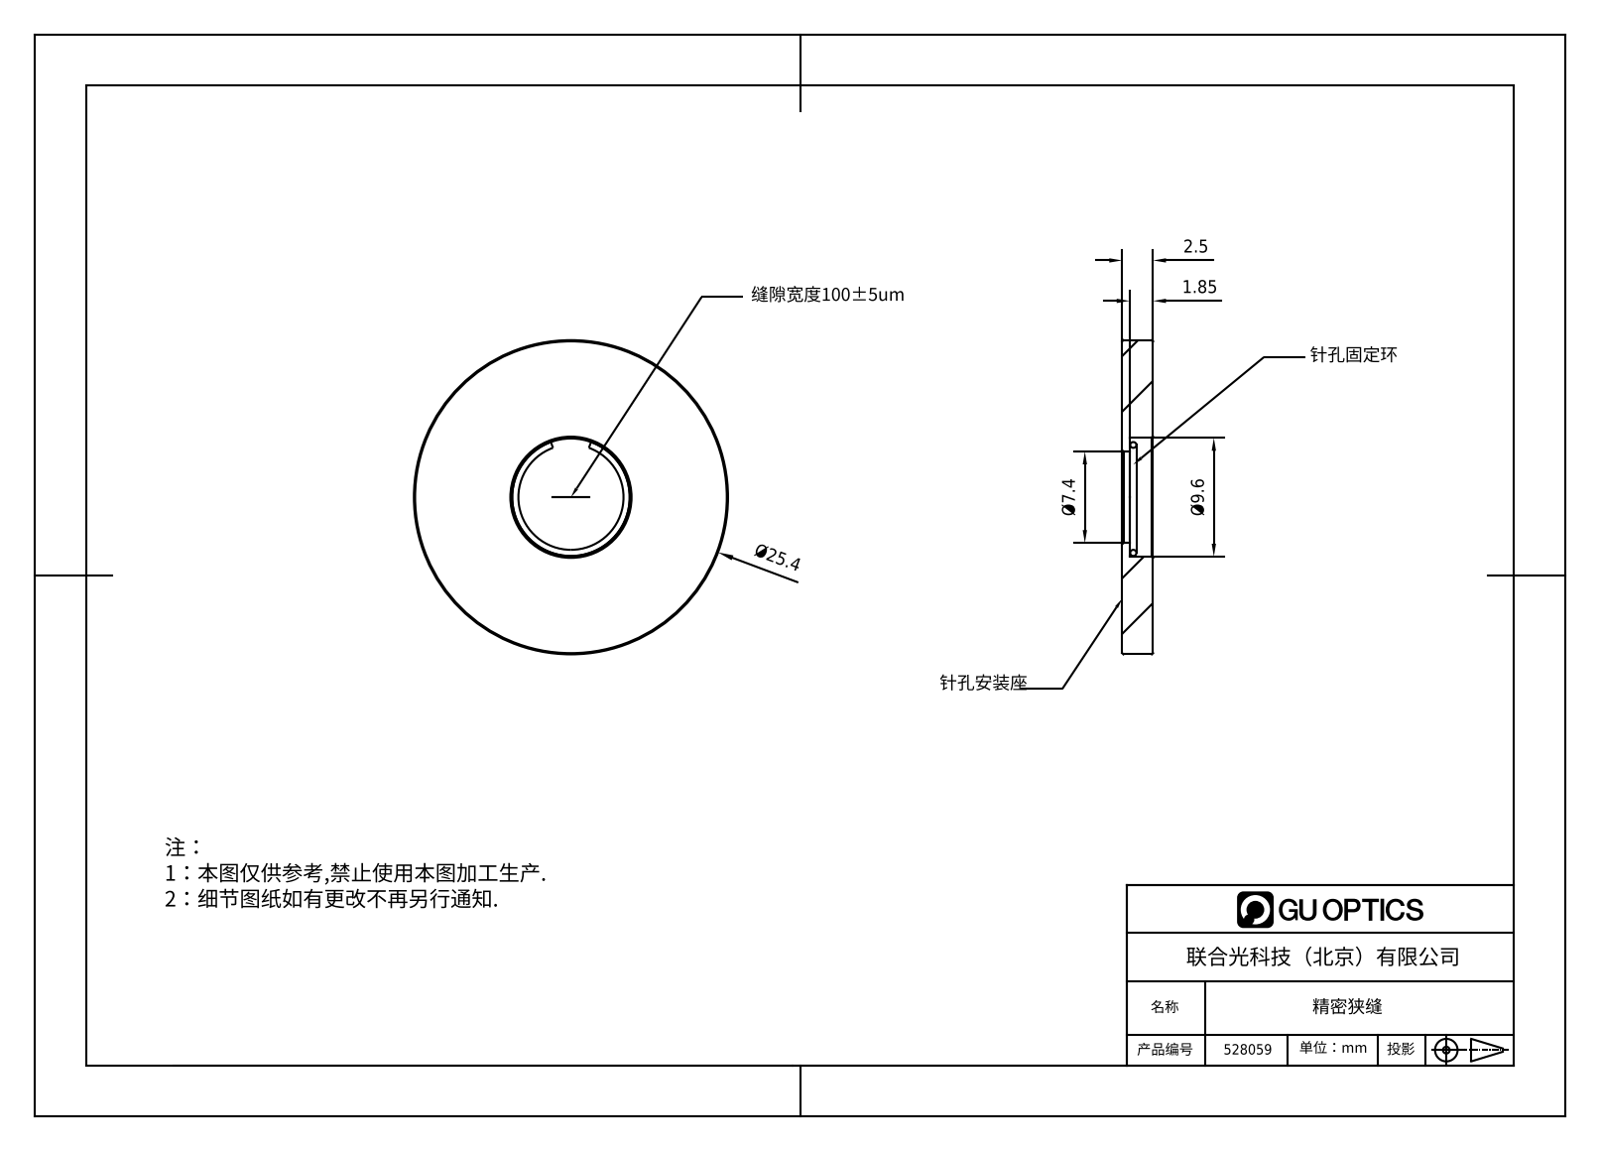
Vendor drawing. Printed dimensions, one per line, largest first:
Ø25.4
Ø9.6
Ø7.4
2.5
1.85
